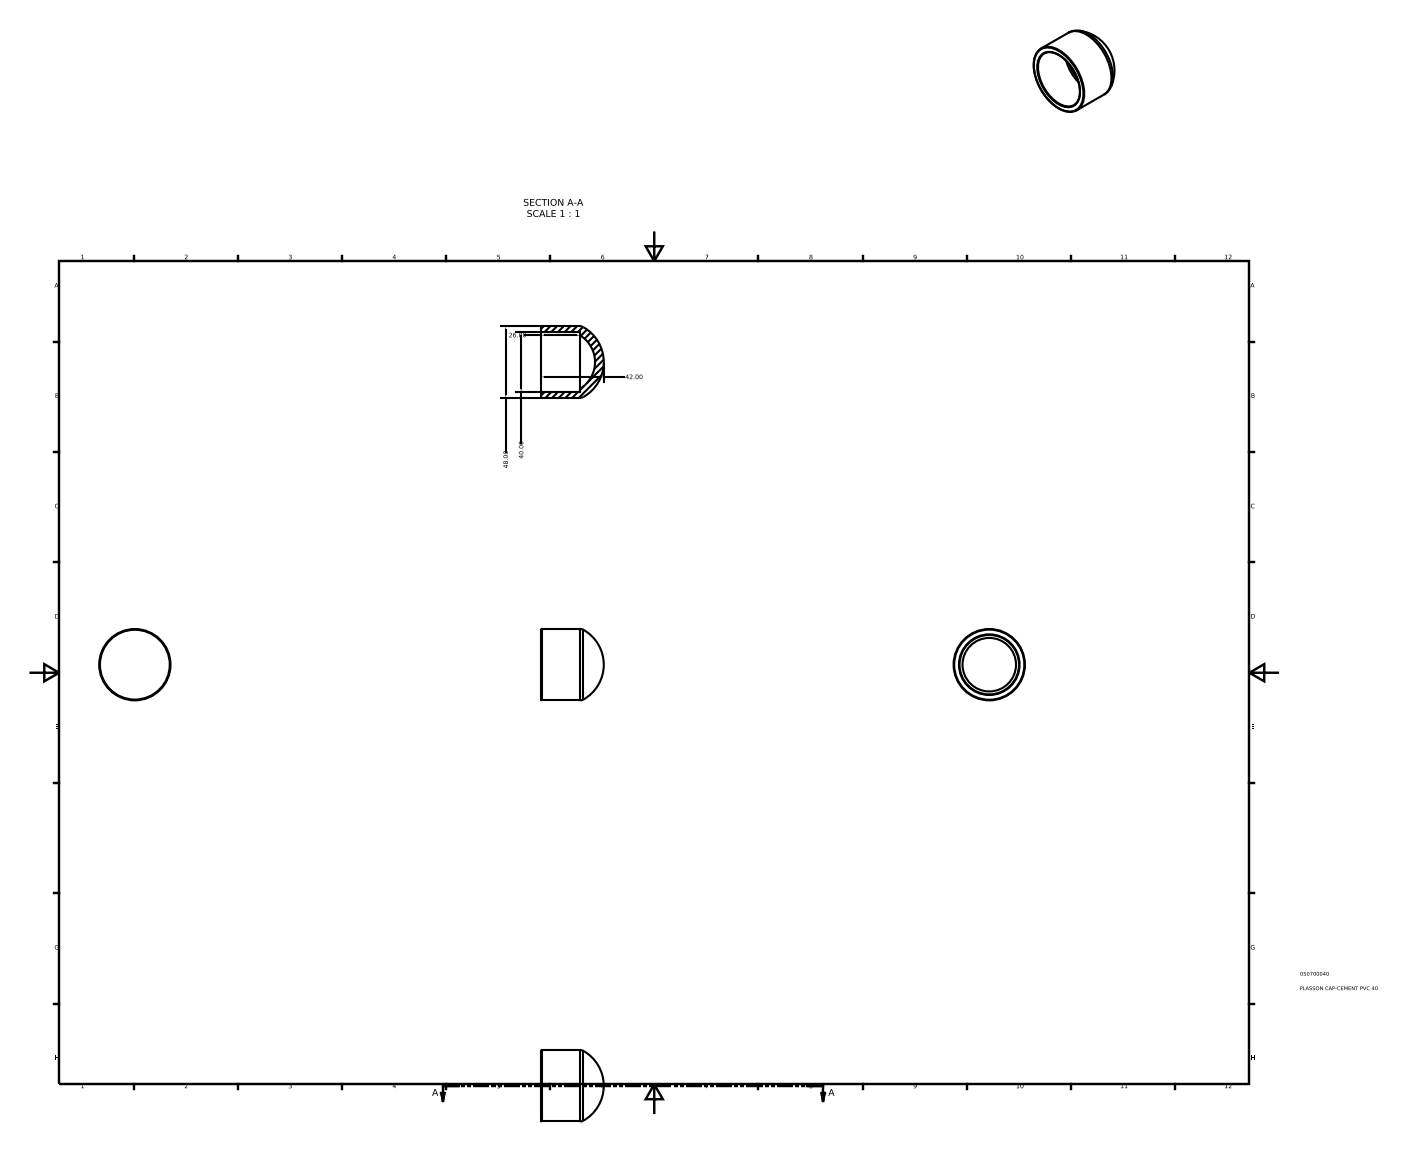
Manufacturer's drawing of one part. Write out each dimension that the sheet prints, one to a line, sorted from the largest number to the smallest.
48.00
42.00
40.00
26.00
